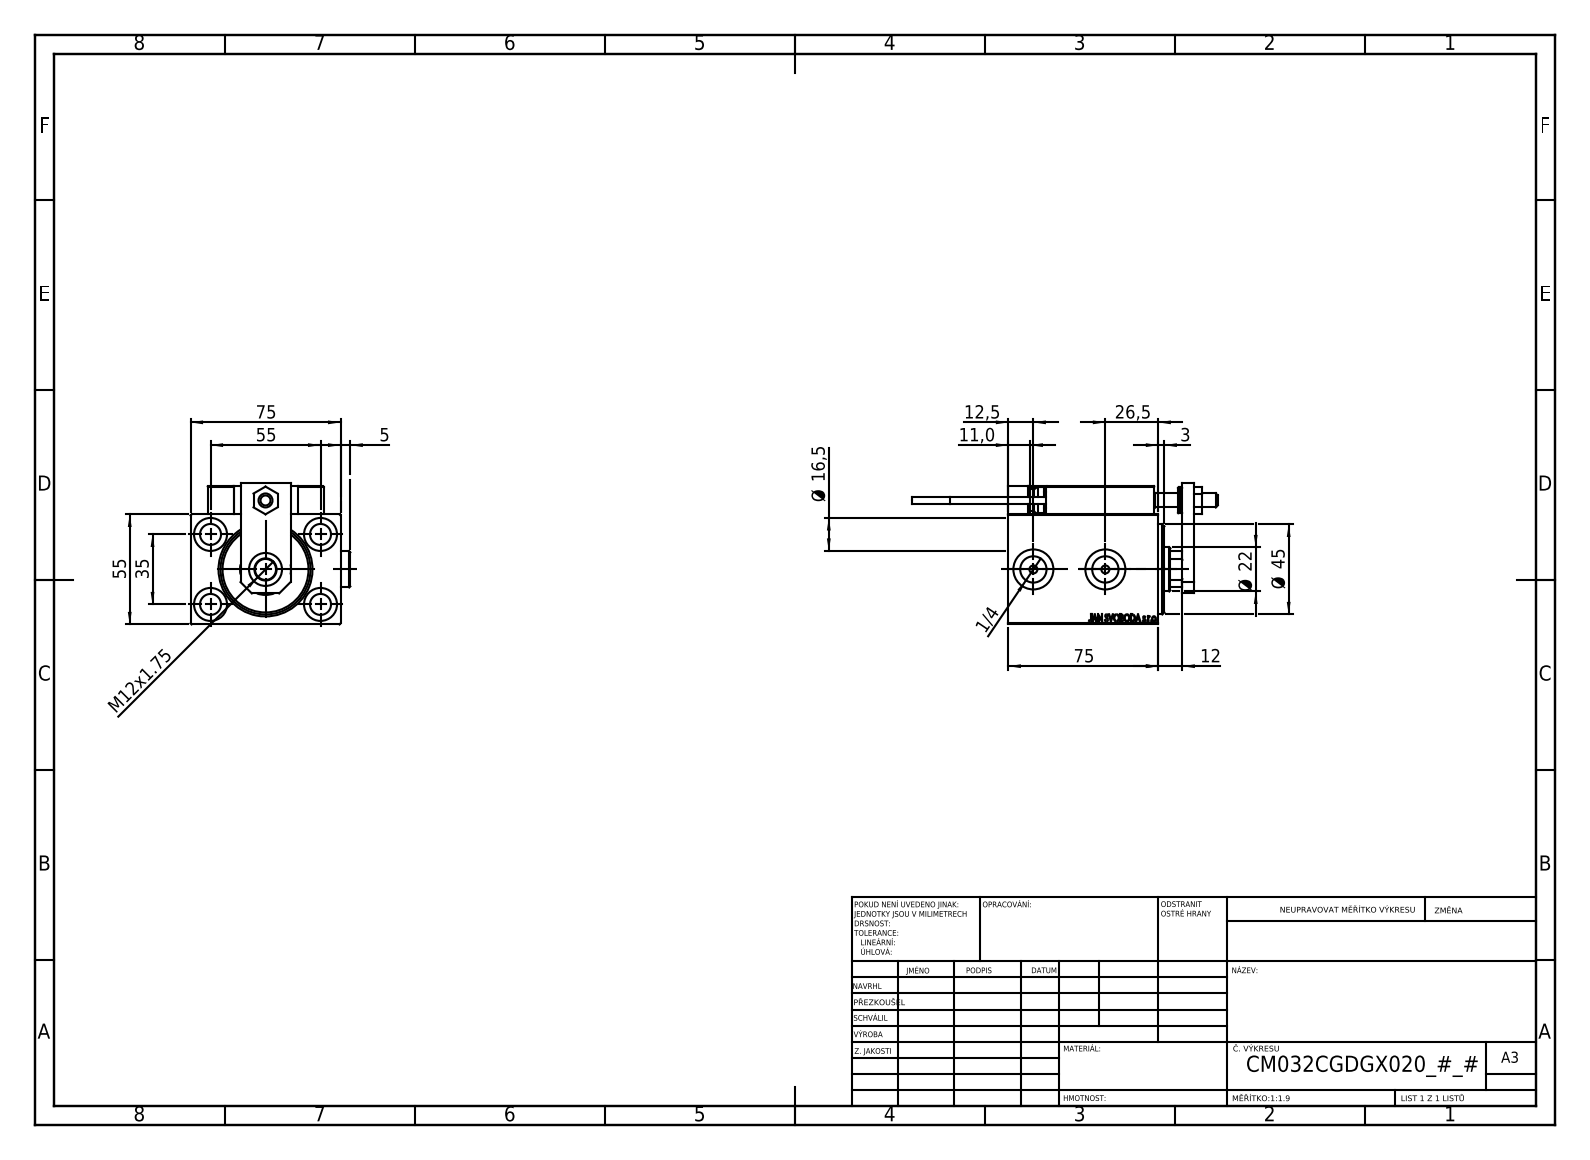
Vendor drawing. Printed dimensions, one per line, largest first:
75
75
55
55
Ø 45
35
26,5
Ø 22
Ø 16,5
12,5
M12x1.75
12
11,0
5
3
1/4
